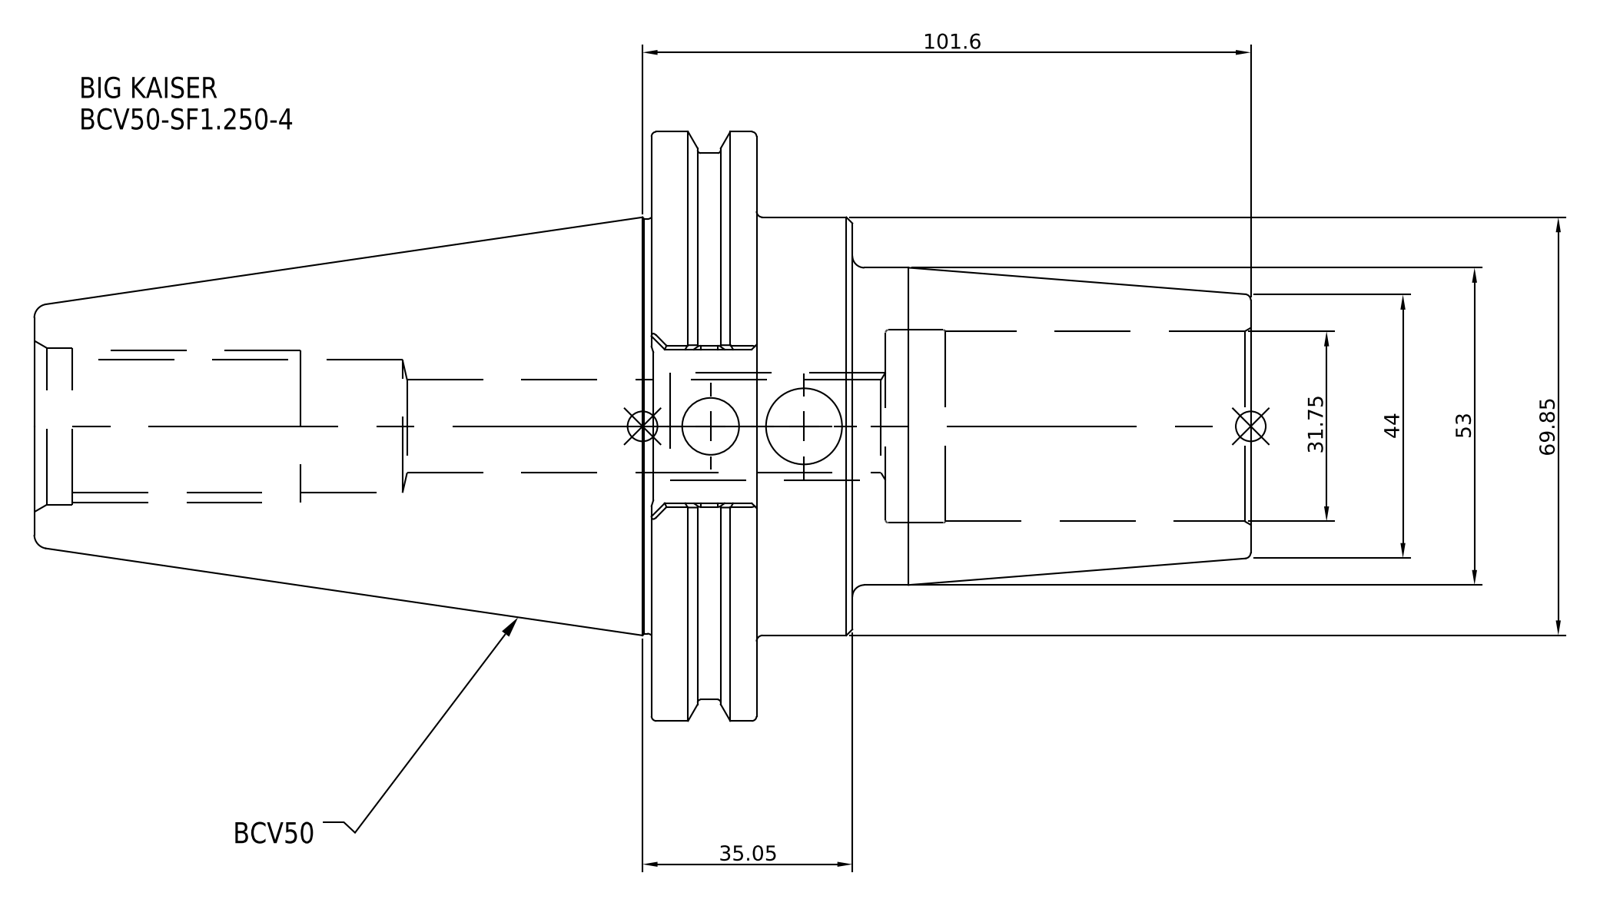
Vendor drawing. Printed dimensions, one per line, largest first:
101.6
69.85
53
44
35.05
31.75
